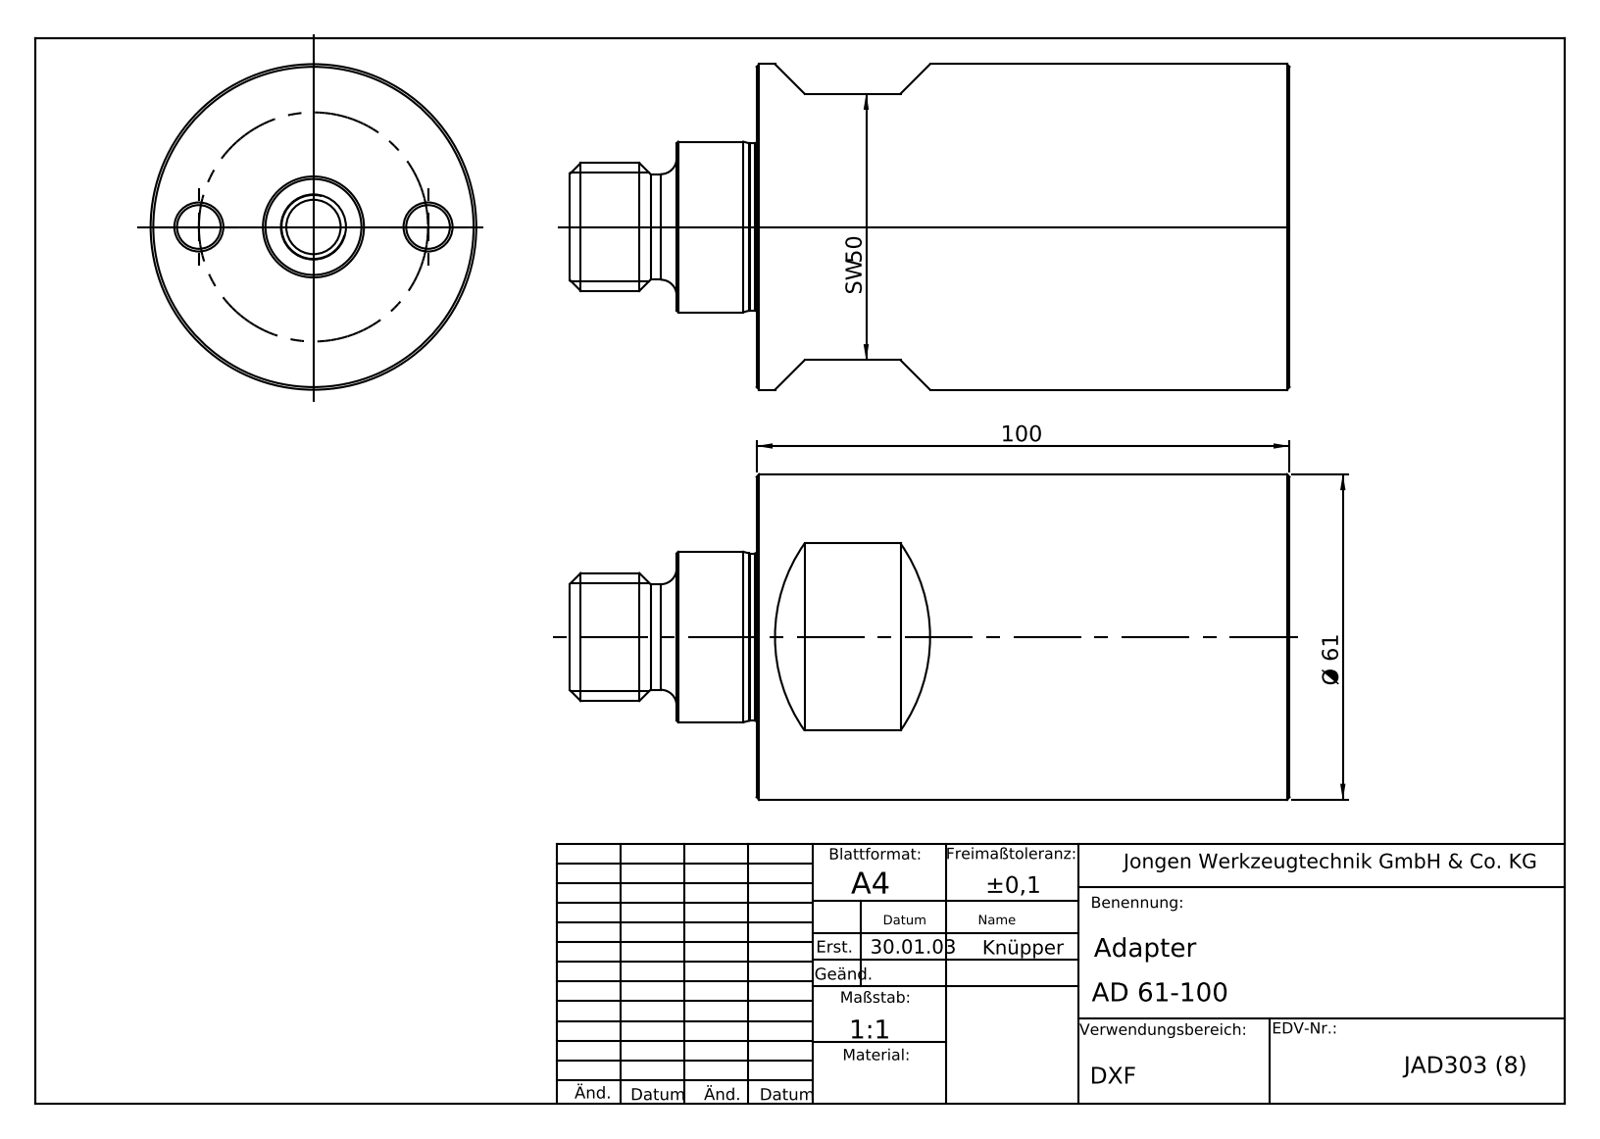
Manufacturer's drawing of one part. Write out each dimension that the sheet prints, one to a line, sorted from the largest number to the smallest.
100
Ø 61
SW 50
